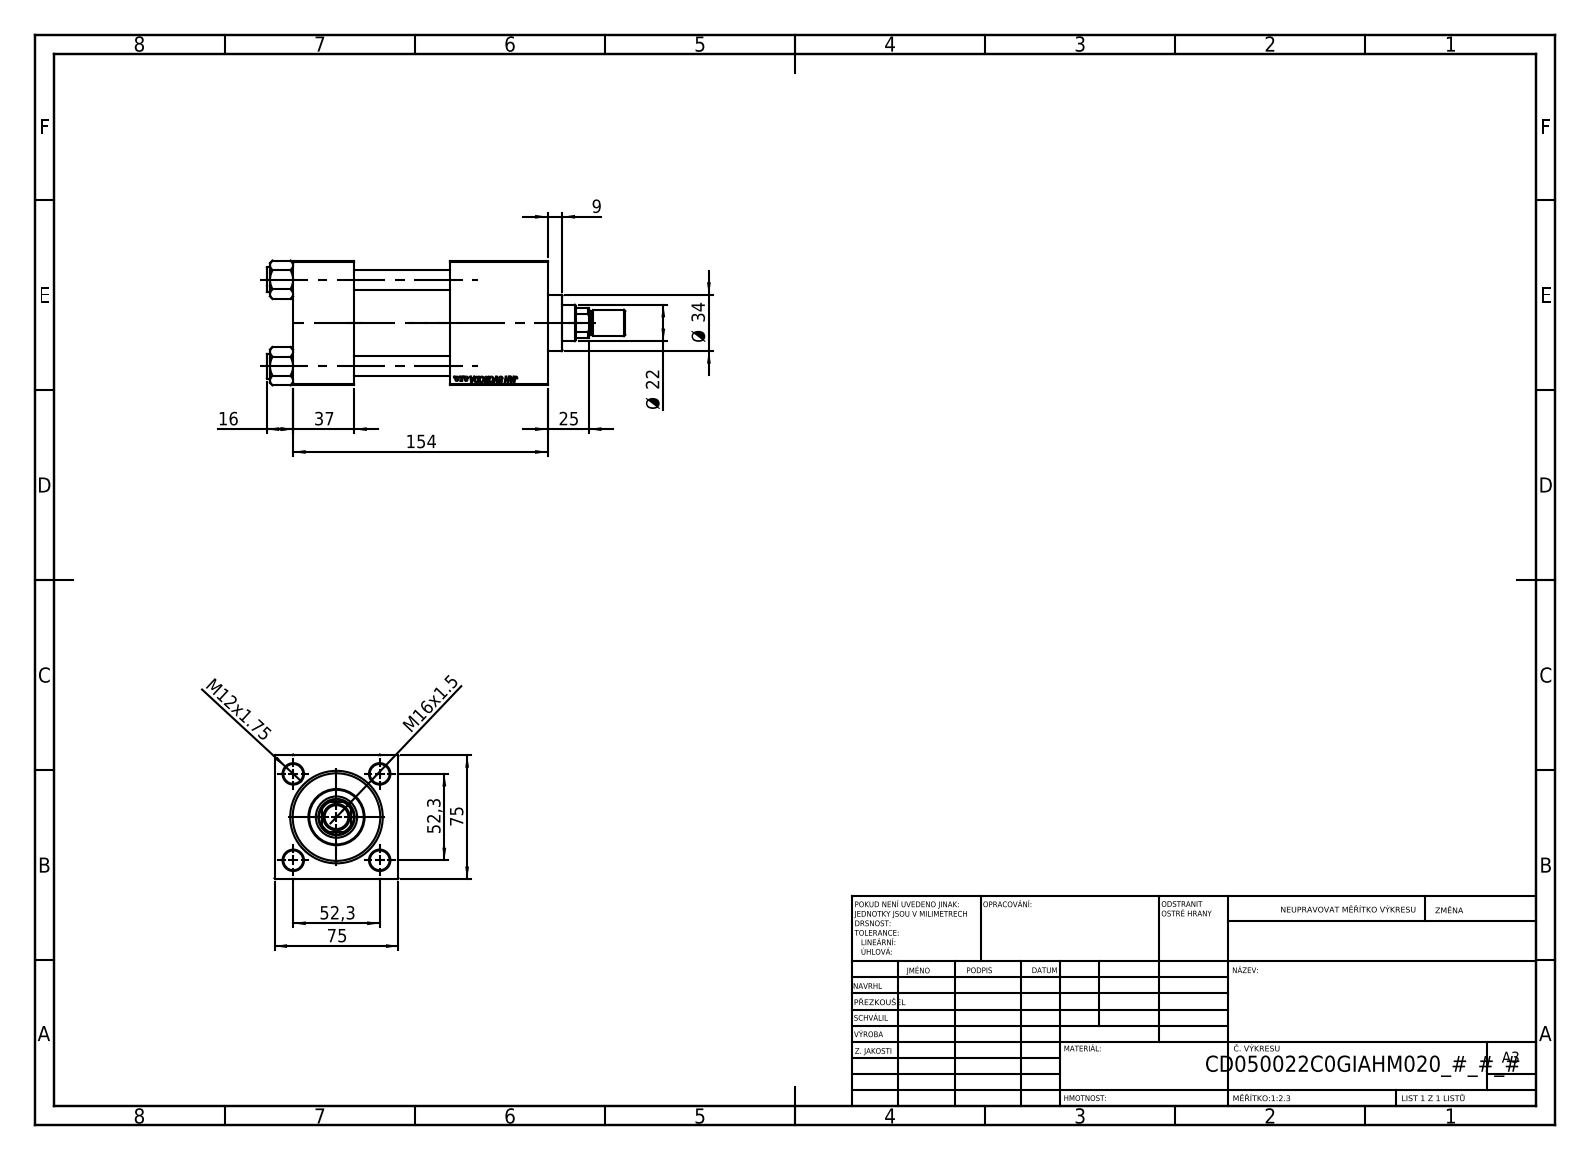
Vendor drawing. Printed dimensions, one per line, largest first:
154
75
75
52,3
52,3
37
Ø 34
25
Ø 22
16
M16x1.5
M12x1.75
9
